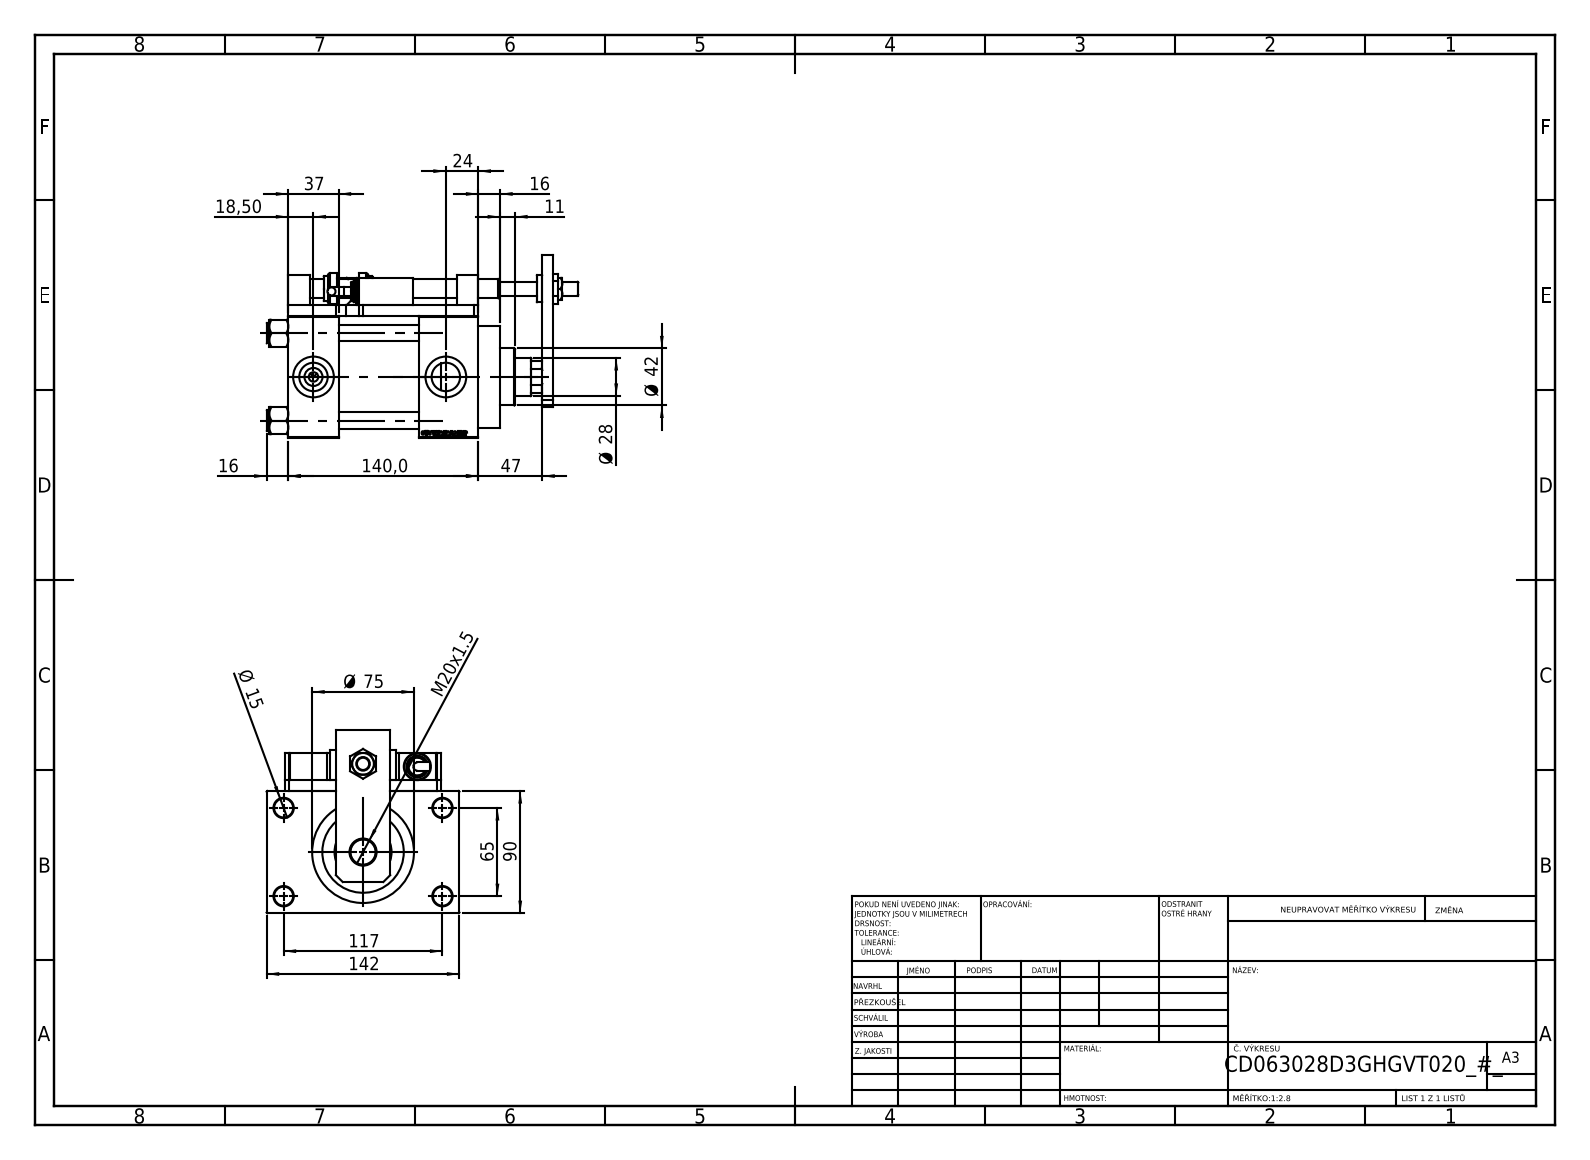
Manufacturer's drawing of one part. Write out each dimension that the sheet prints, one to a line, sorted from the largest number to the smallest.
142
140,0
117
90
Ø 75
65
47
Ø 42
37
Ø 28
24
M20x1.5
18,50
16
16
Ø 15
11
